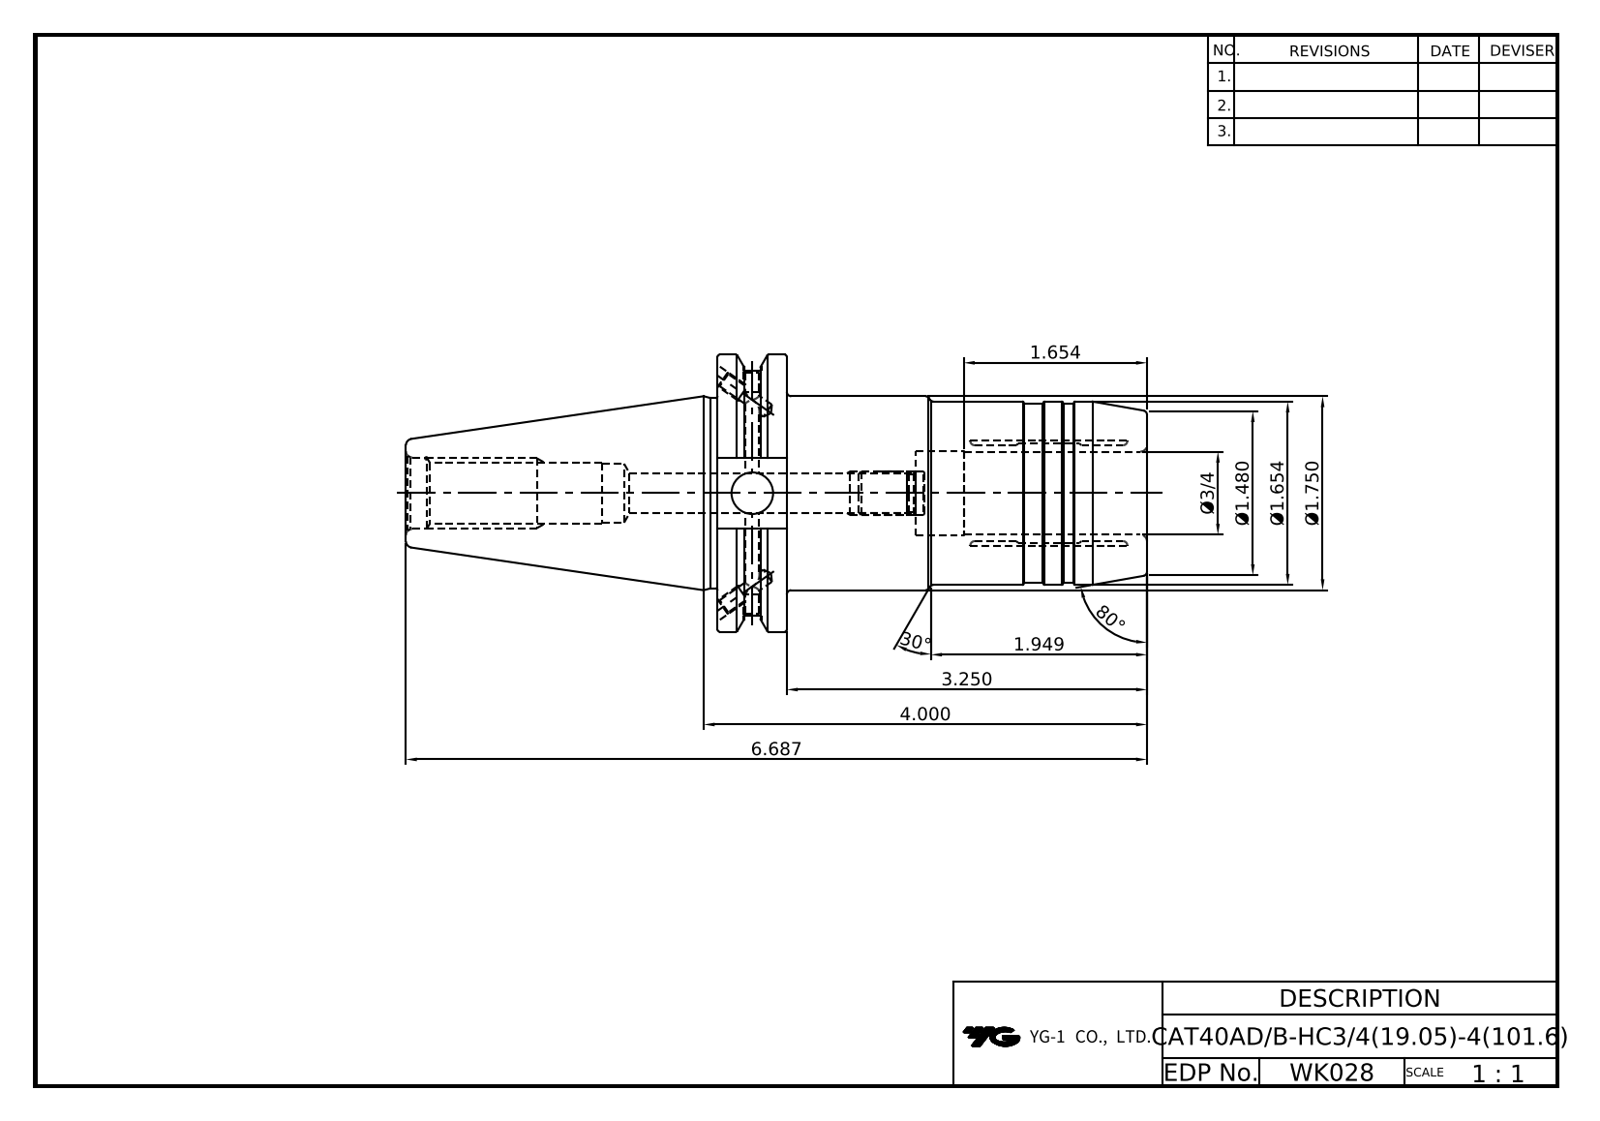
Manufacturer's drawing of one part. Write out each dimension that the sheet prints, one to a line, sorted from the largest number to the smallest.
80°
30°
6.687
4.000
3.250
1.949
Ø1.750
Ø1.654
1.654
Ø1.480
Ø3/4
